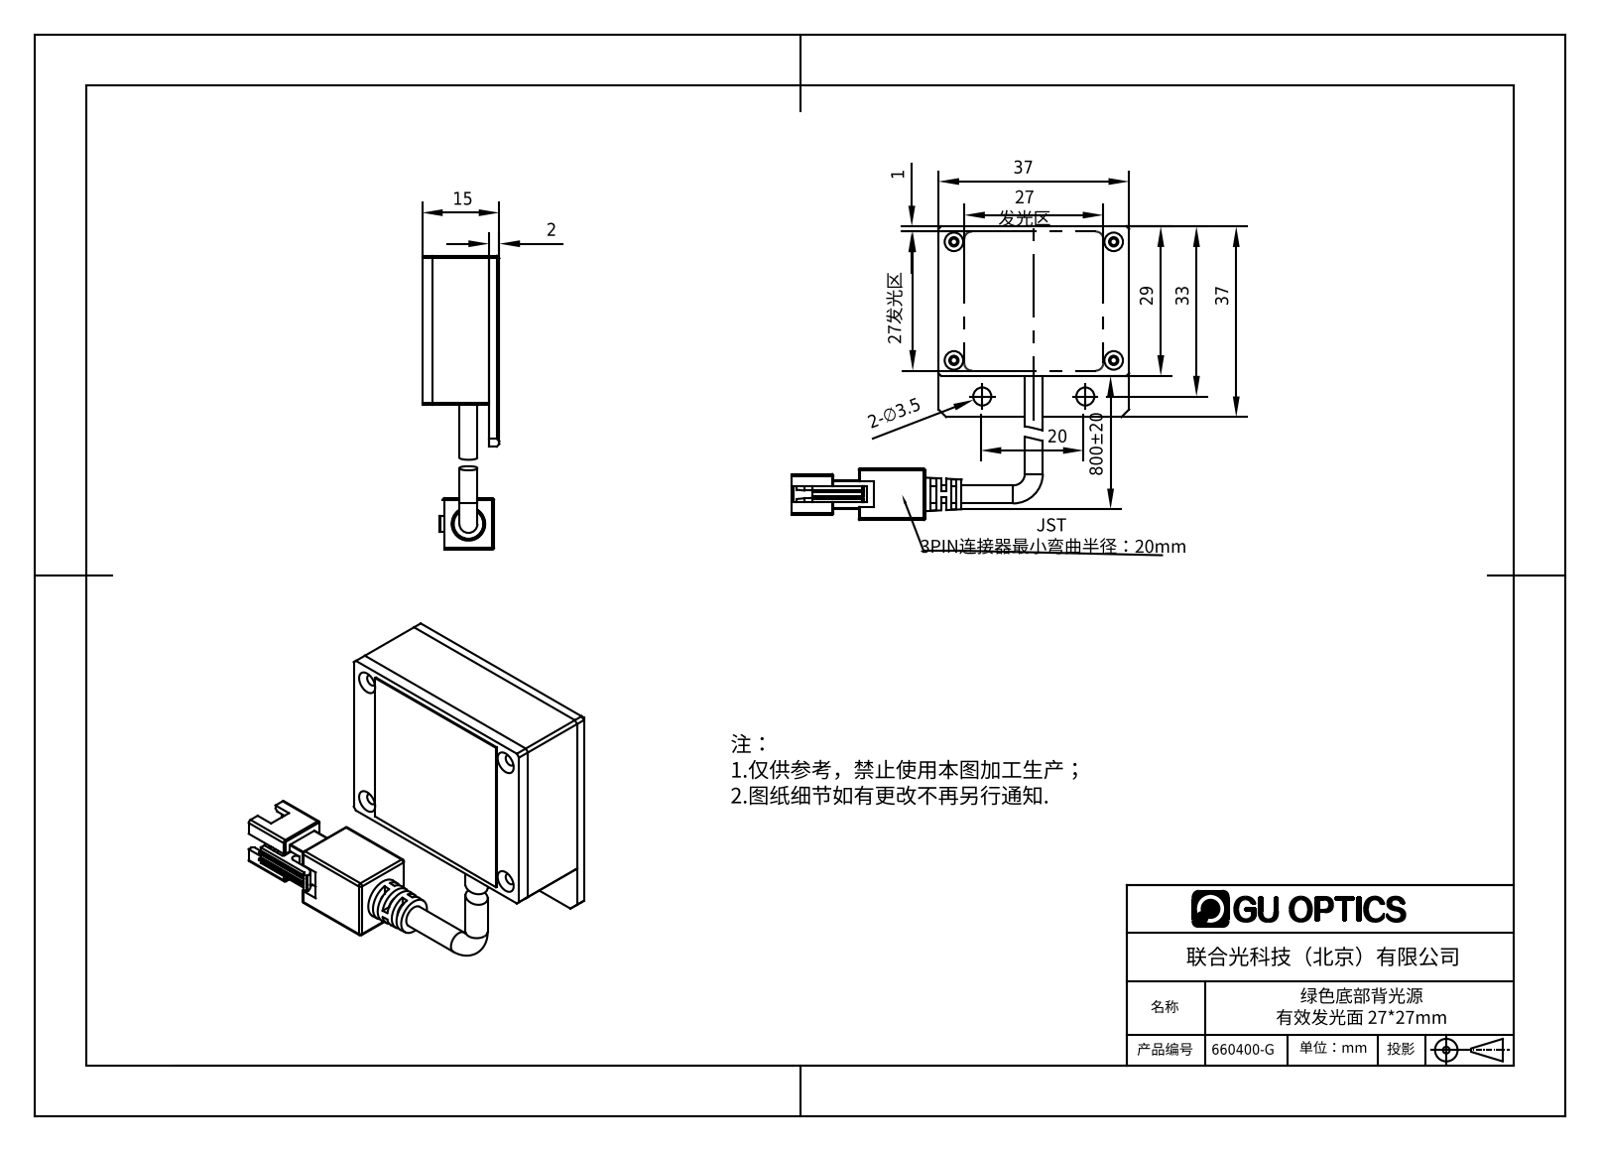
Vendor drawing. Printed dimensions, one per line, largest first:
800±20
37
37
33
29
27 发光区
27发光区
20
15
2-∅3.5
2
1
